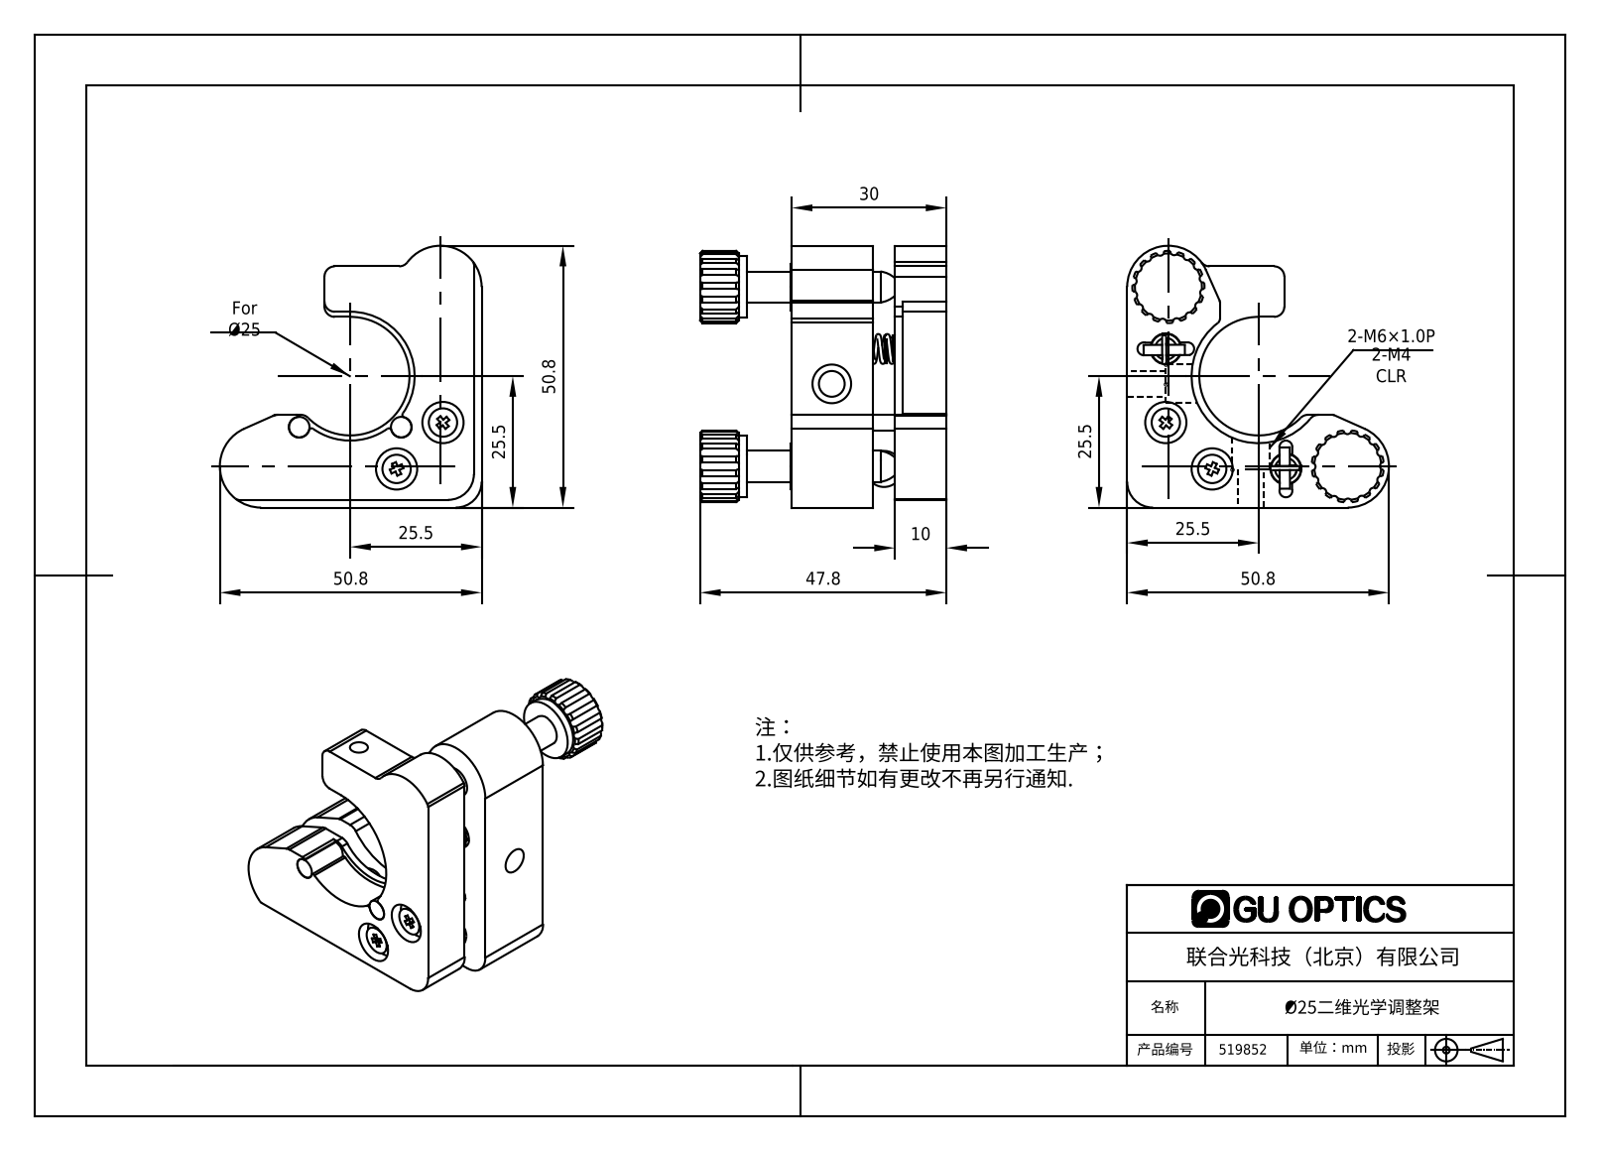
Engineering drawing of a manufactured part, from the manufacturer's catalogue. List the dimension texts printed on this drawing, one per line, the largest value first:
50.8
50.8
50.8
47.8
30
25.5
25.5
25.5
25.5
10
